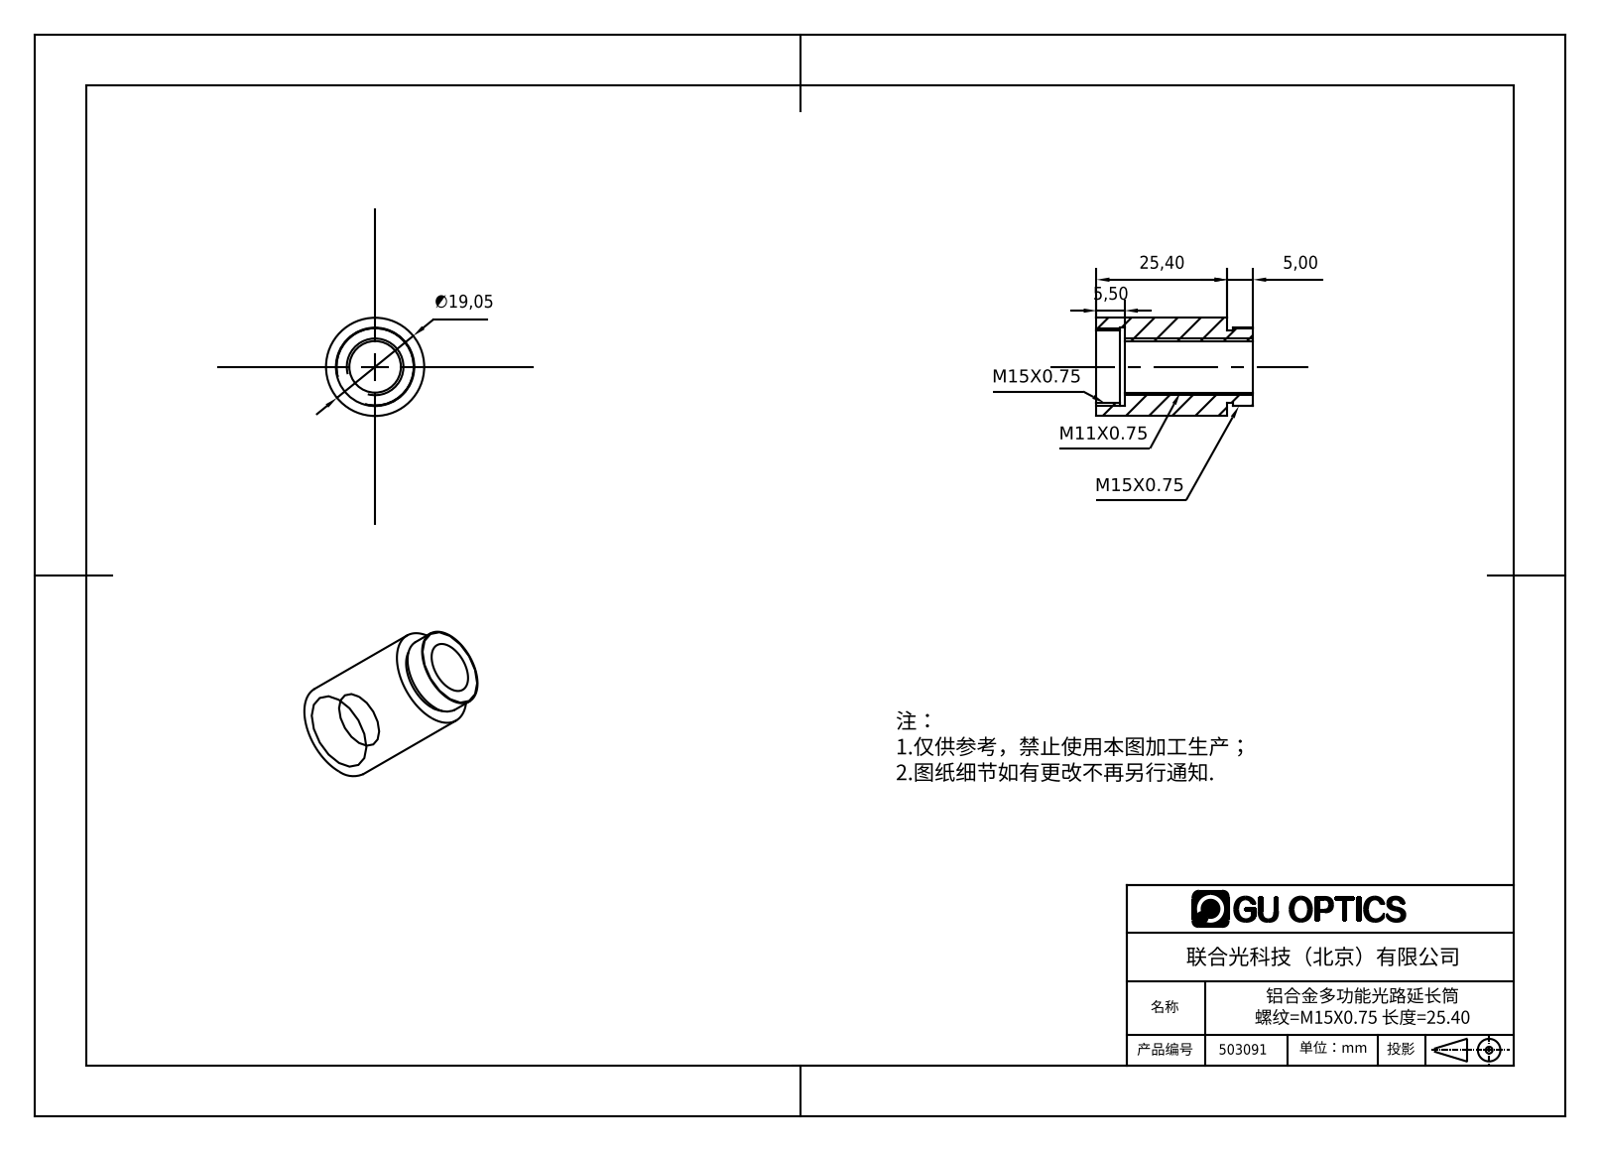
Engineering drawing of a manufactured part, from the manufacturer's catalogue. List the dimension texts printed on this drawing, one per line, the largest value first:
25,40
∅19,05
5,50
5,00
